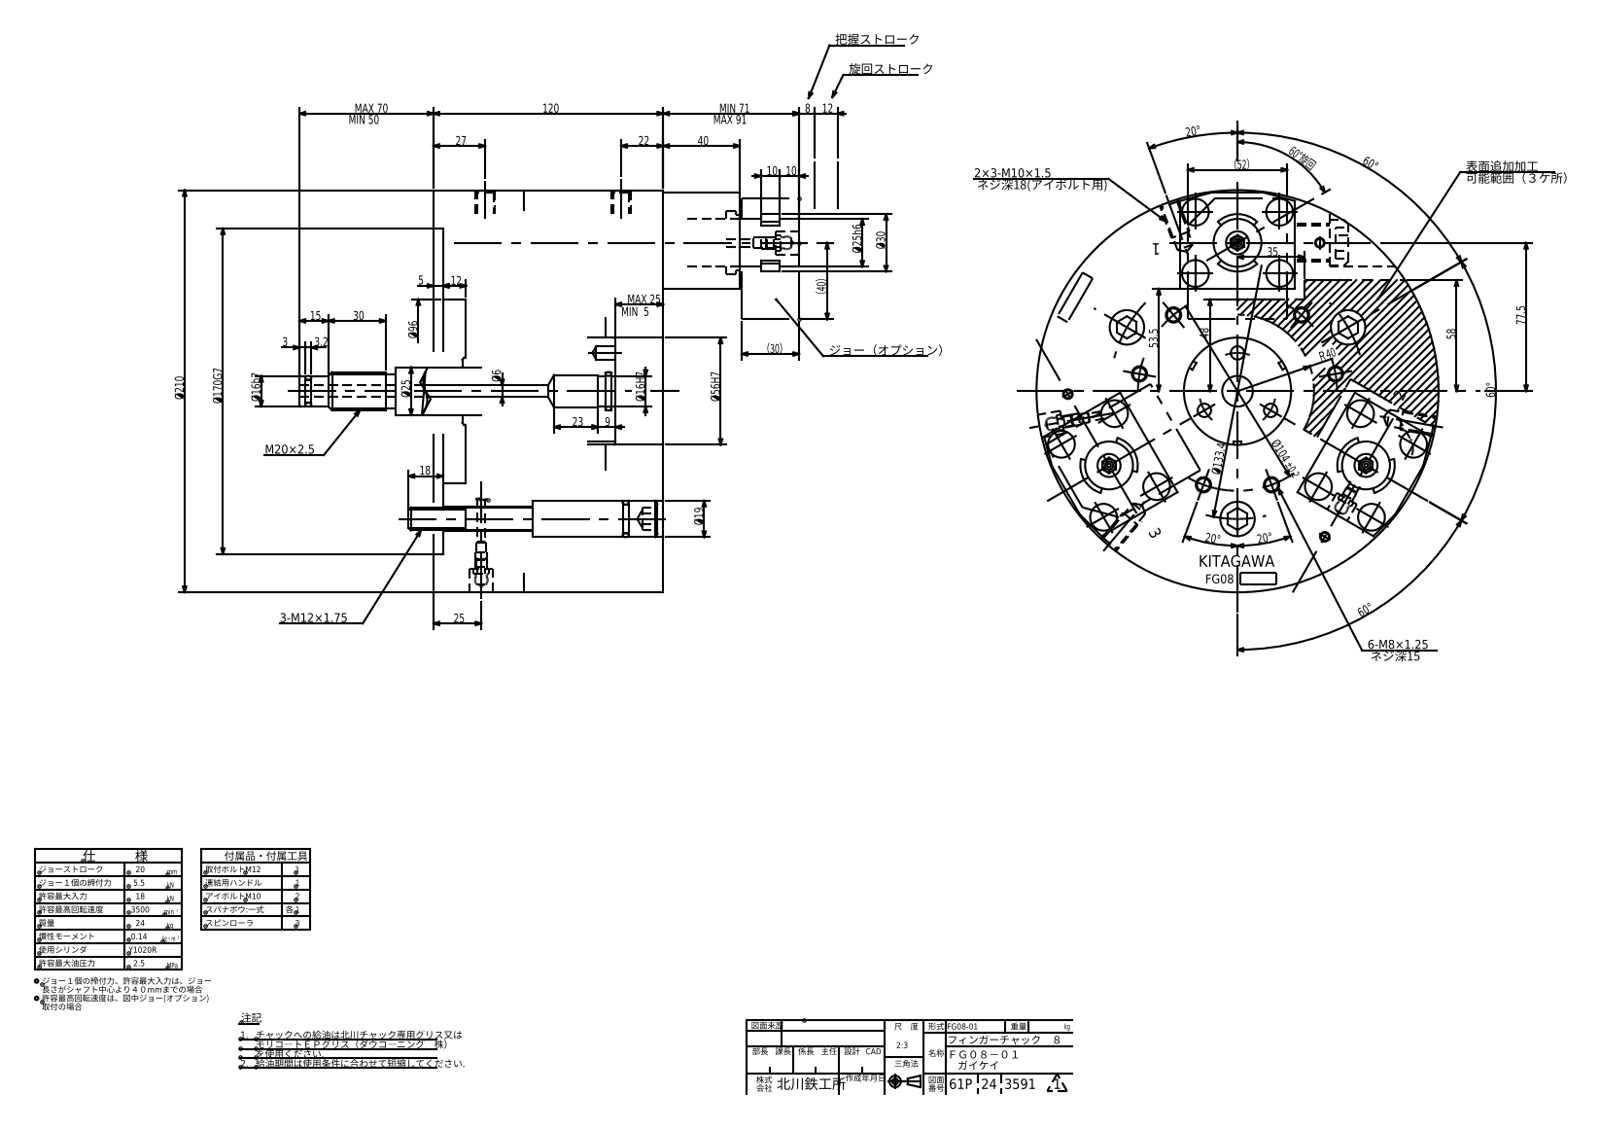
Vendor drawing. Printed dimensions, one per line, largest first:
Ø210
Ø170G7
Ø133.4
120
Ø104 ±0.2
77.5
MIN 71
MAX 70
60°旋回
60°
60°
60°
58
Ø56H7
53.5
（52）
48
40
Ｒ40
（40）
35
30
Ø30
（30）
27
Ø25
MAX 25
Ø25h6
25
23
22
20°
20°
20°
Ø19
18
Ø16h7
Ø16H7
15
12
12
10
10
9
8
Ø6
5
3.2
3
